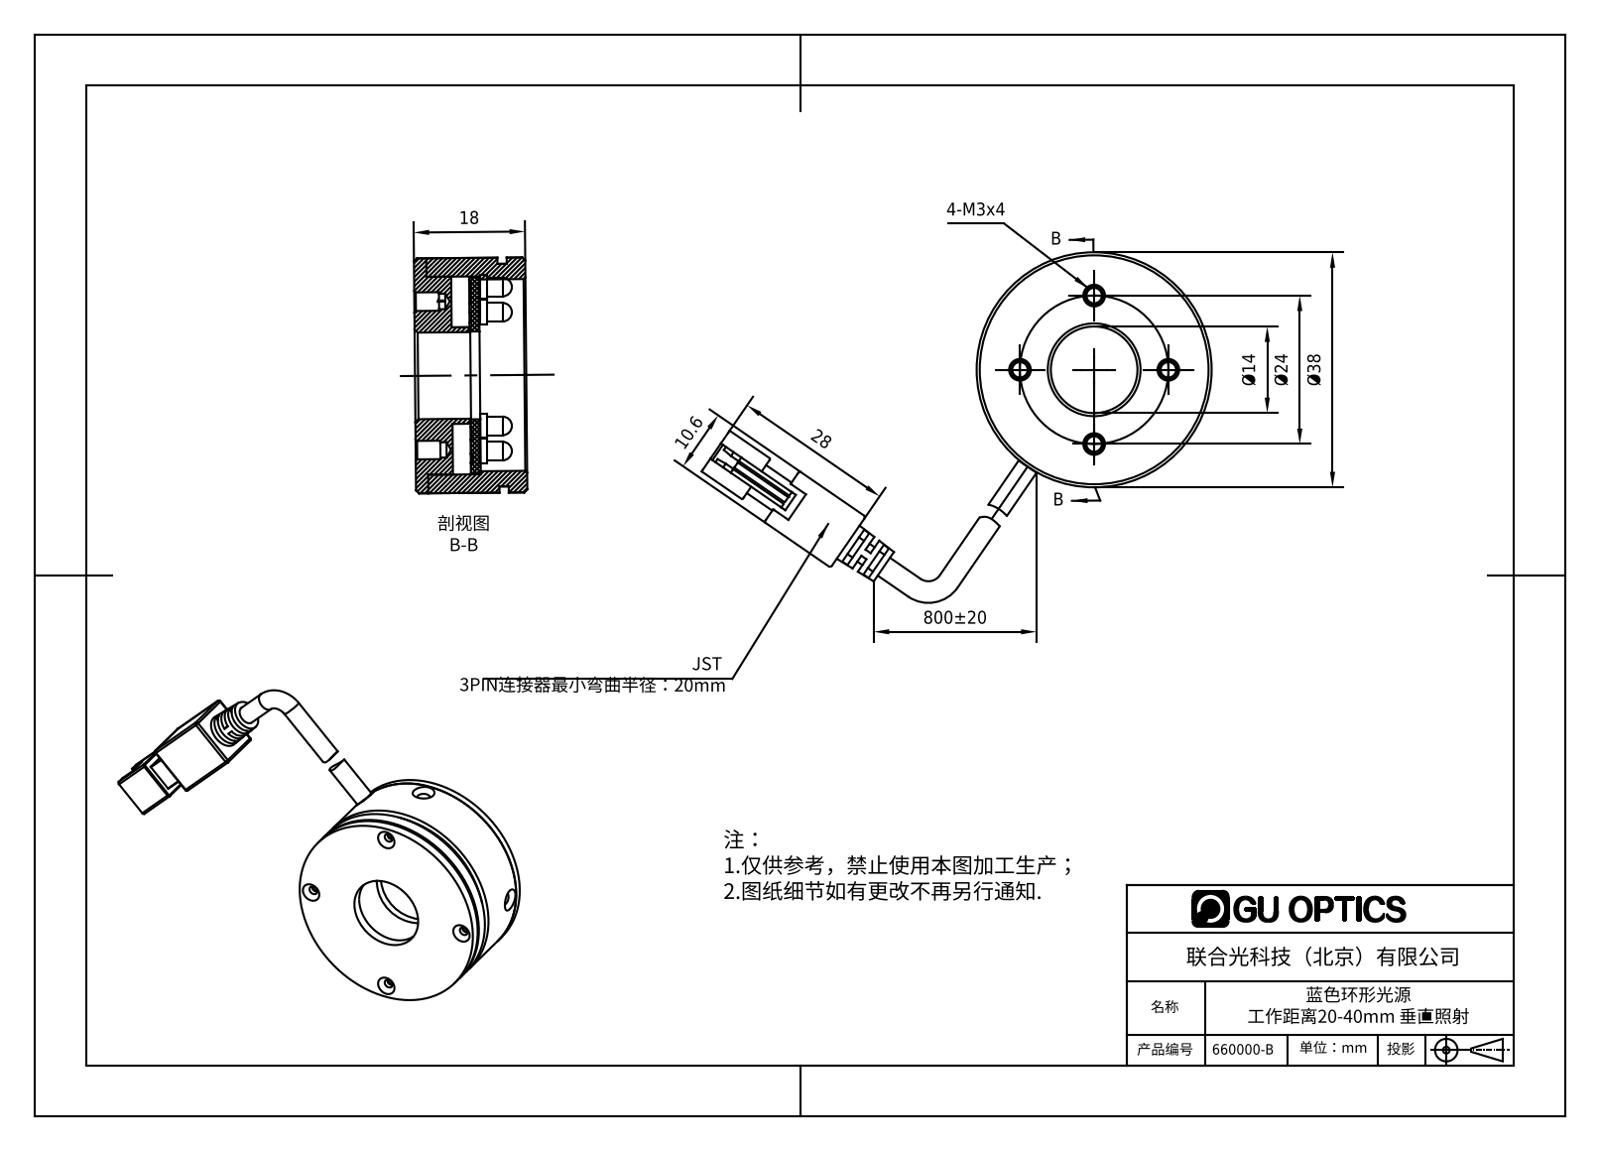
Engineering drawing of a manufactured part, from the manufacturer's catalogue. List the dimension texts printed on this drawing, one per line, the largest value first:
800±20
Ø38
28
Ø24
18
Ø14
10.6
